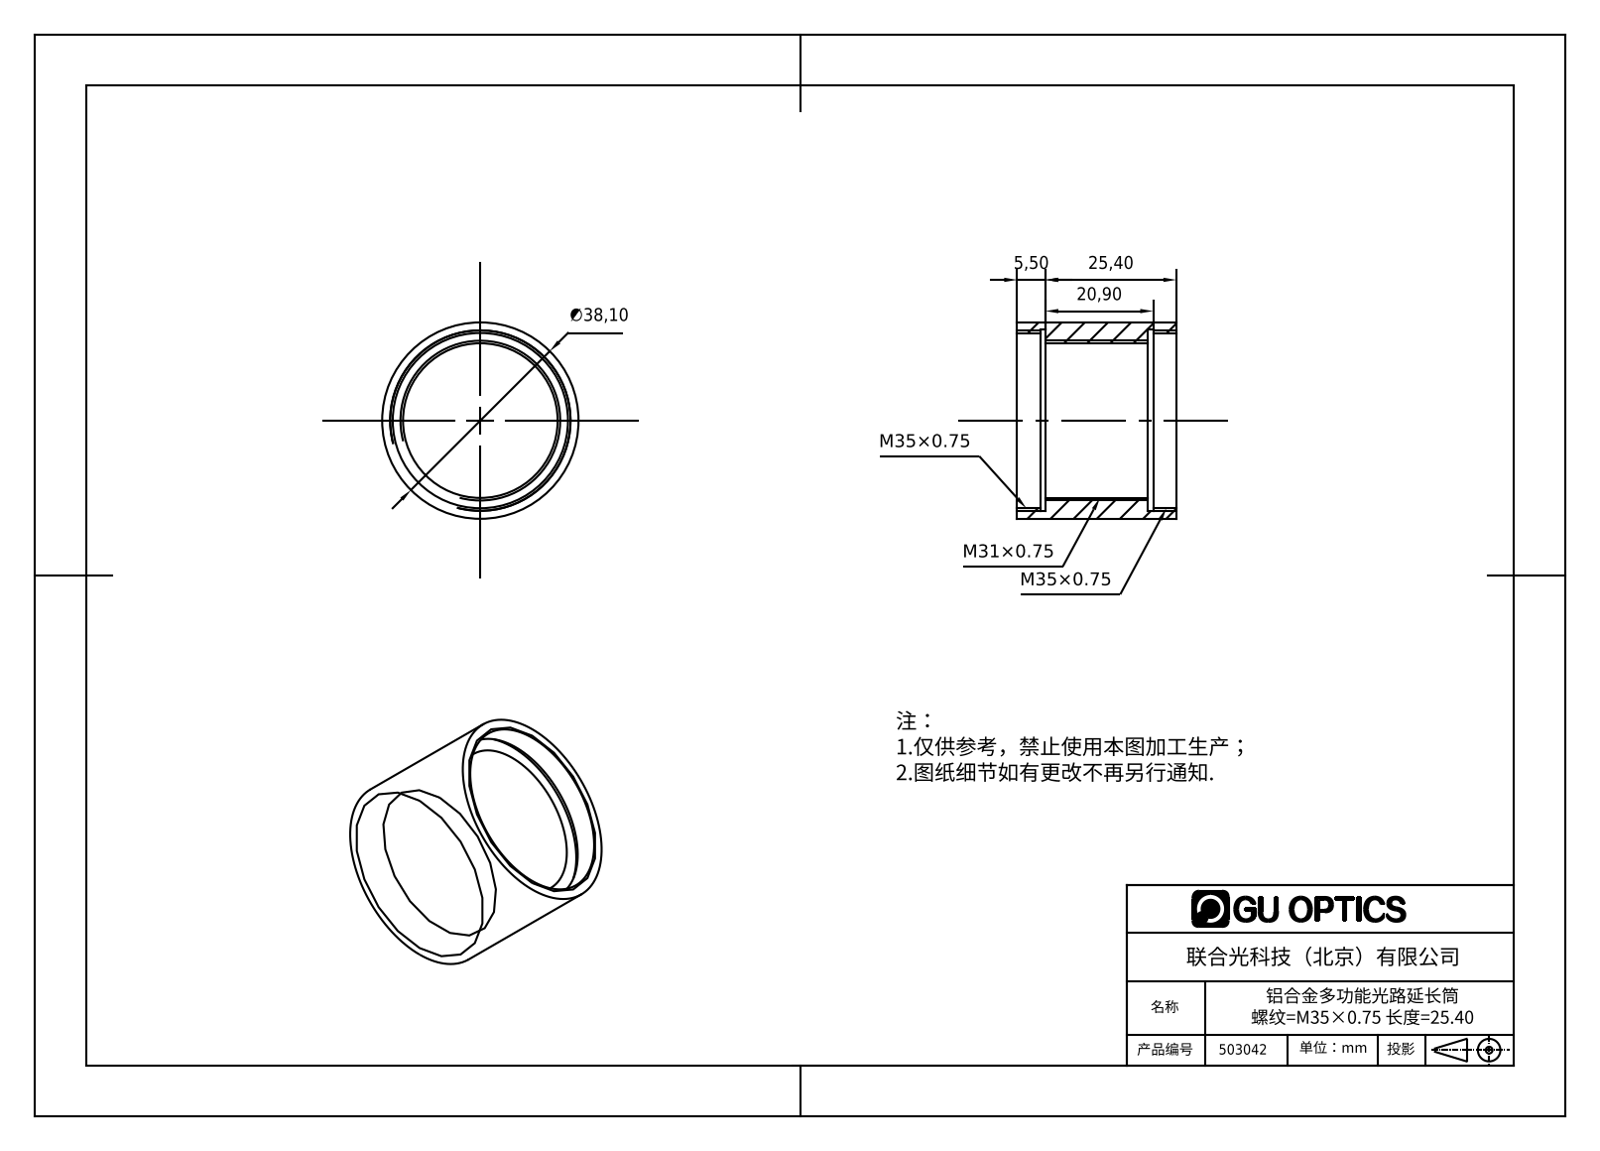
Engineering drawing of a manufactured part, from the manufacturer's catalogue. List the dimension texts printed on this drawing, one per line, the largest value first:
∅38,10
25,40
20,90
5,50
